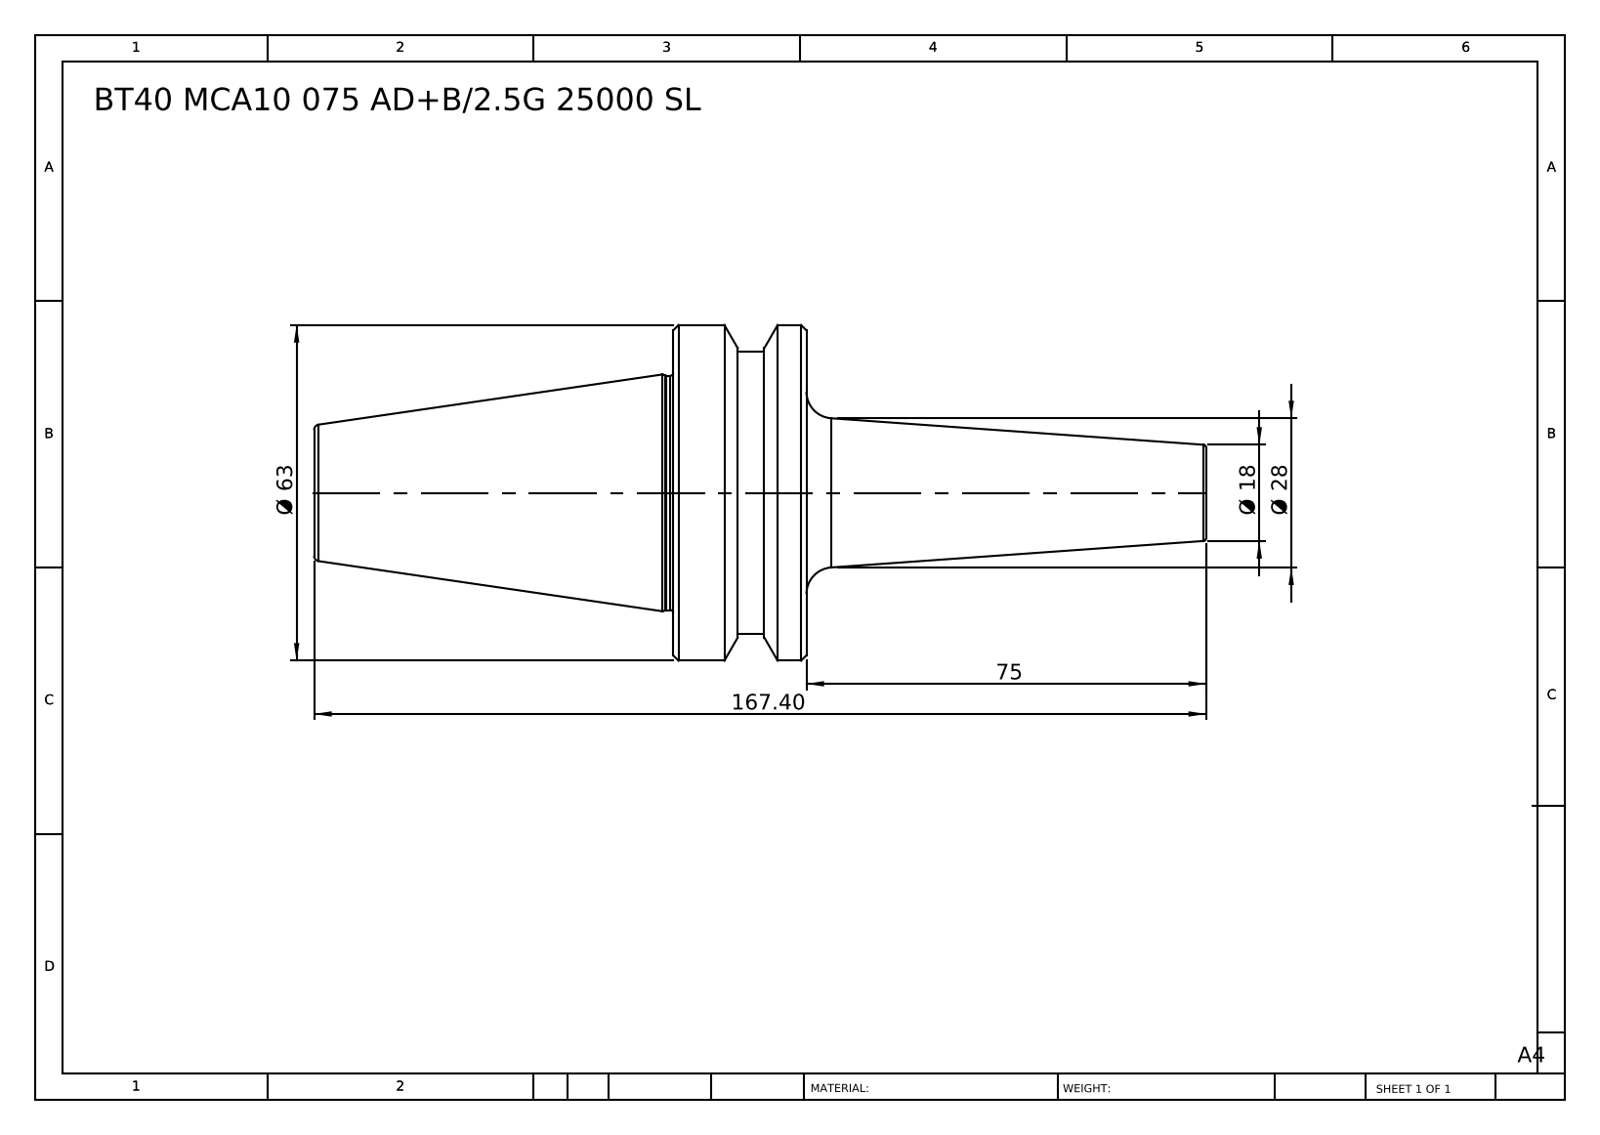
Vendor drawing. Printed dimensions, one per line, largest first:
167.40
75
Ø 63
Ø 28
Ø 18
